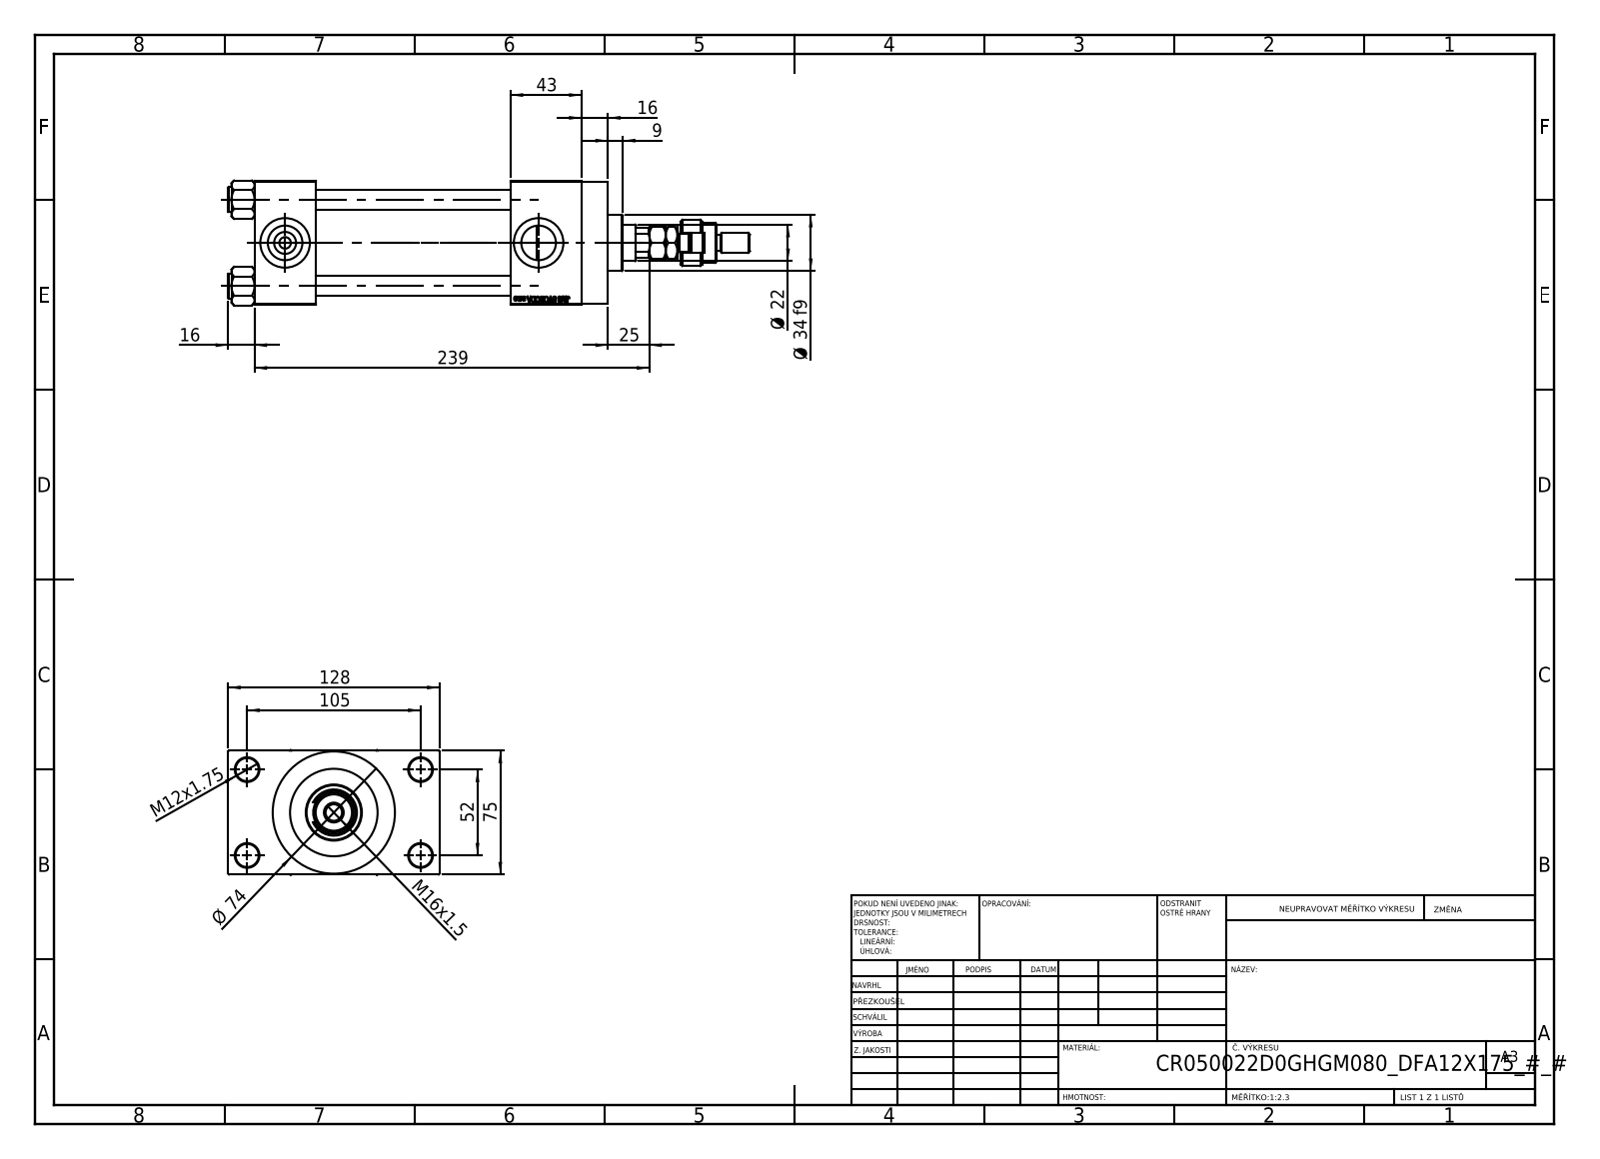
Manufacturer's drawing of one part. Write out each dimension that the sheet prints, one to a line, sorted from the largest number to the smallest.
239
128
105
75
Ø 74
52
43
Ø 34 f9
25
Ø 22
16
16
M16x1.5
M12x1.75
9
